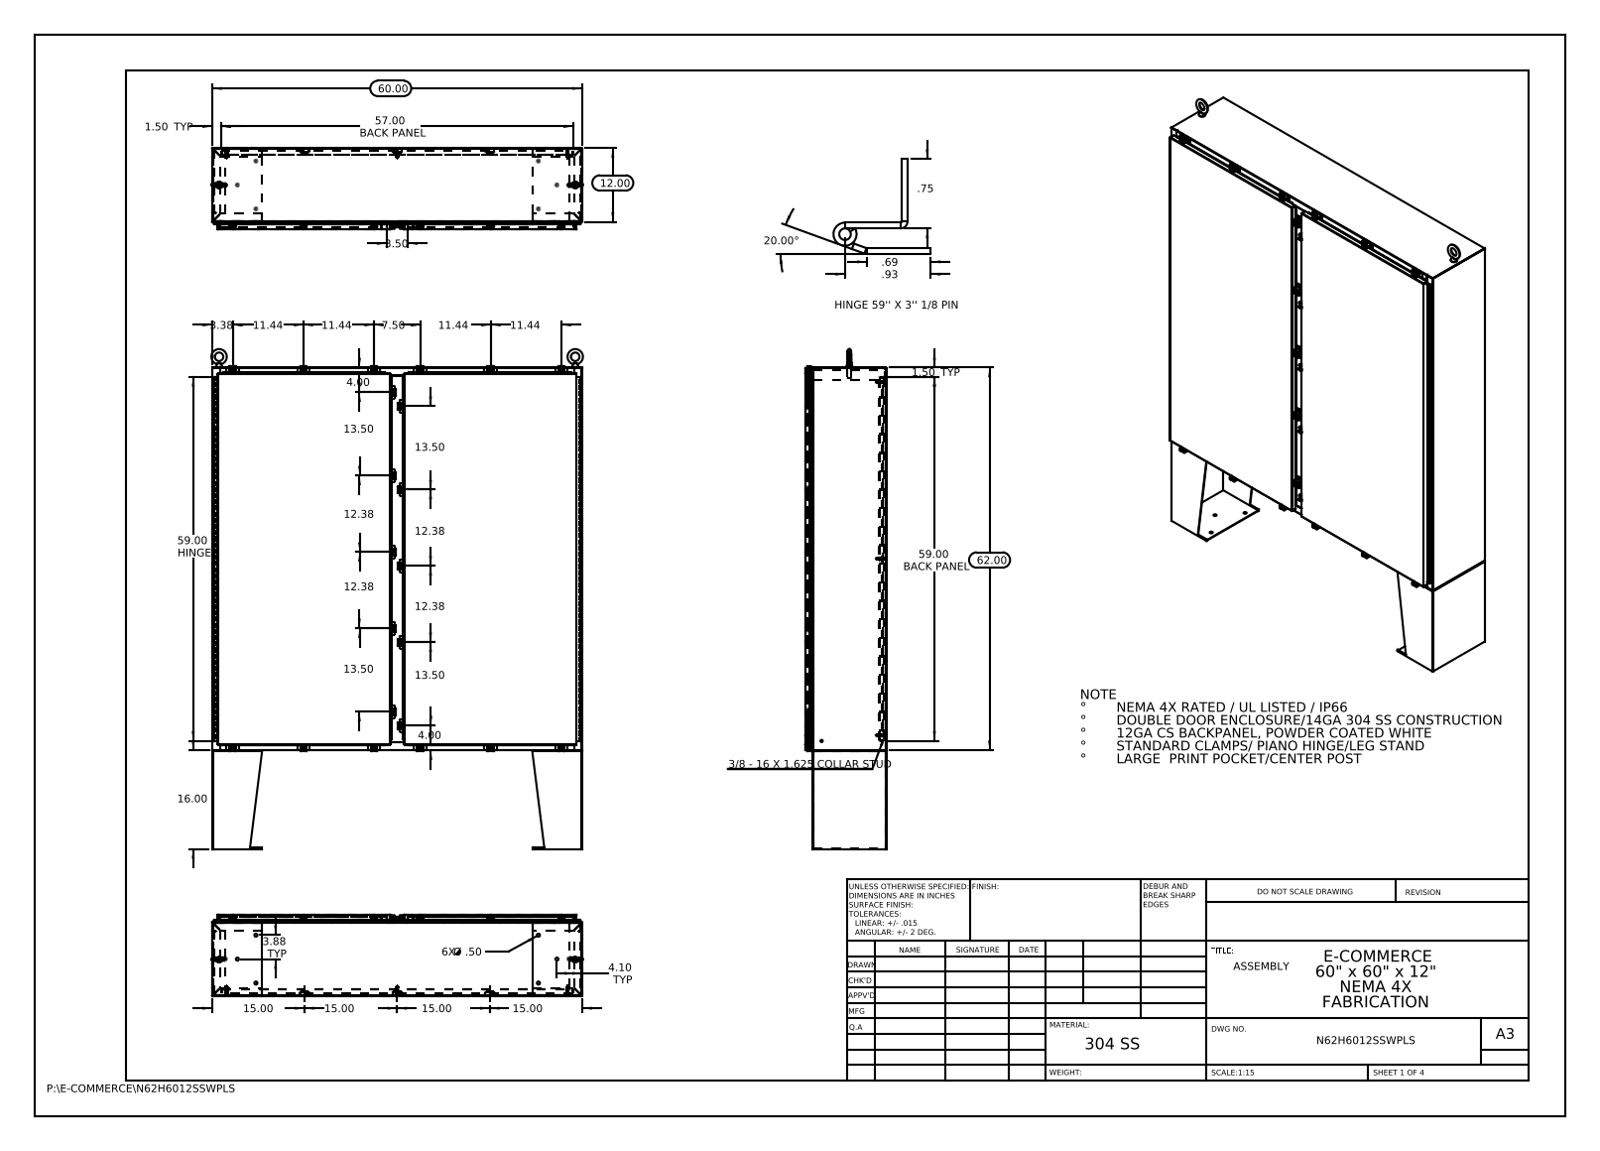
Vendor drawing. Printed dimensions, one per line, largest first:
62.00
60.00
59.00 HINGE
59.00 BACK PANEL
57.00 BACK PANEL
20.00°
16.00
15.00
15.00
15.00
15.00
13.50
13.50
13.50
13.50
12.38
12.38
12.38
12.38
12.00
11.44
11.44
11.44
11.44
7.50
4.10 TYP
4.00
4.00
3.88 TYP
3.50
3.38
1.50 TYP
1.50 TYP
.93
.75
.69
6X Ø .50
